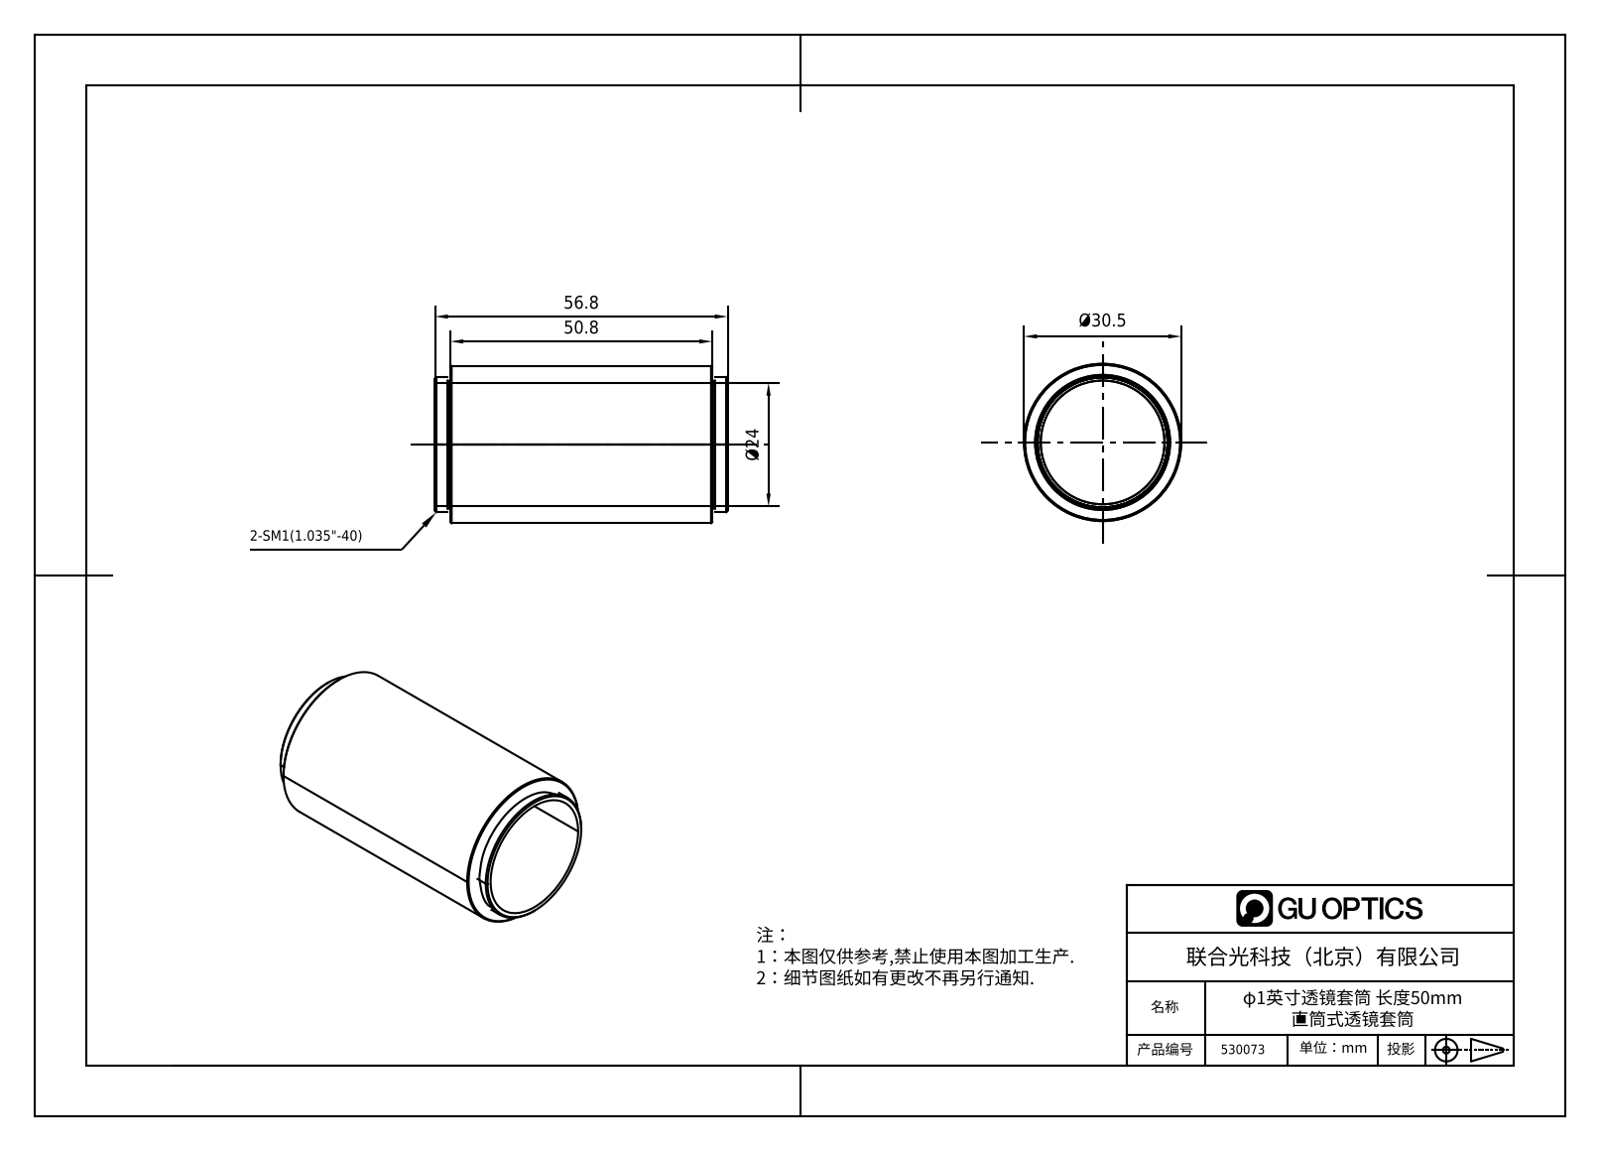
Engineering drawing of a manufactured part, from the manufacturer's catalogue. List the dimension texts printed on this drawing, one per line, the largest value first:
56.8
50.8
Ø30.5
Ø24
